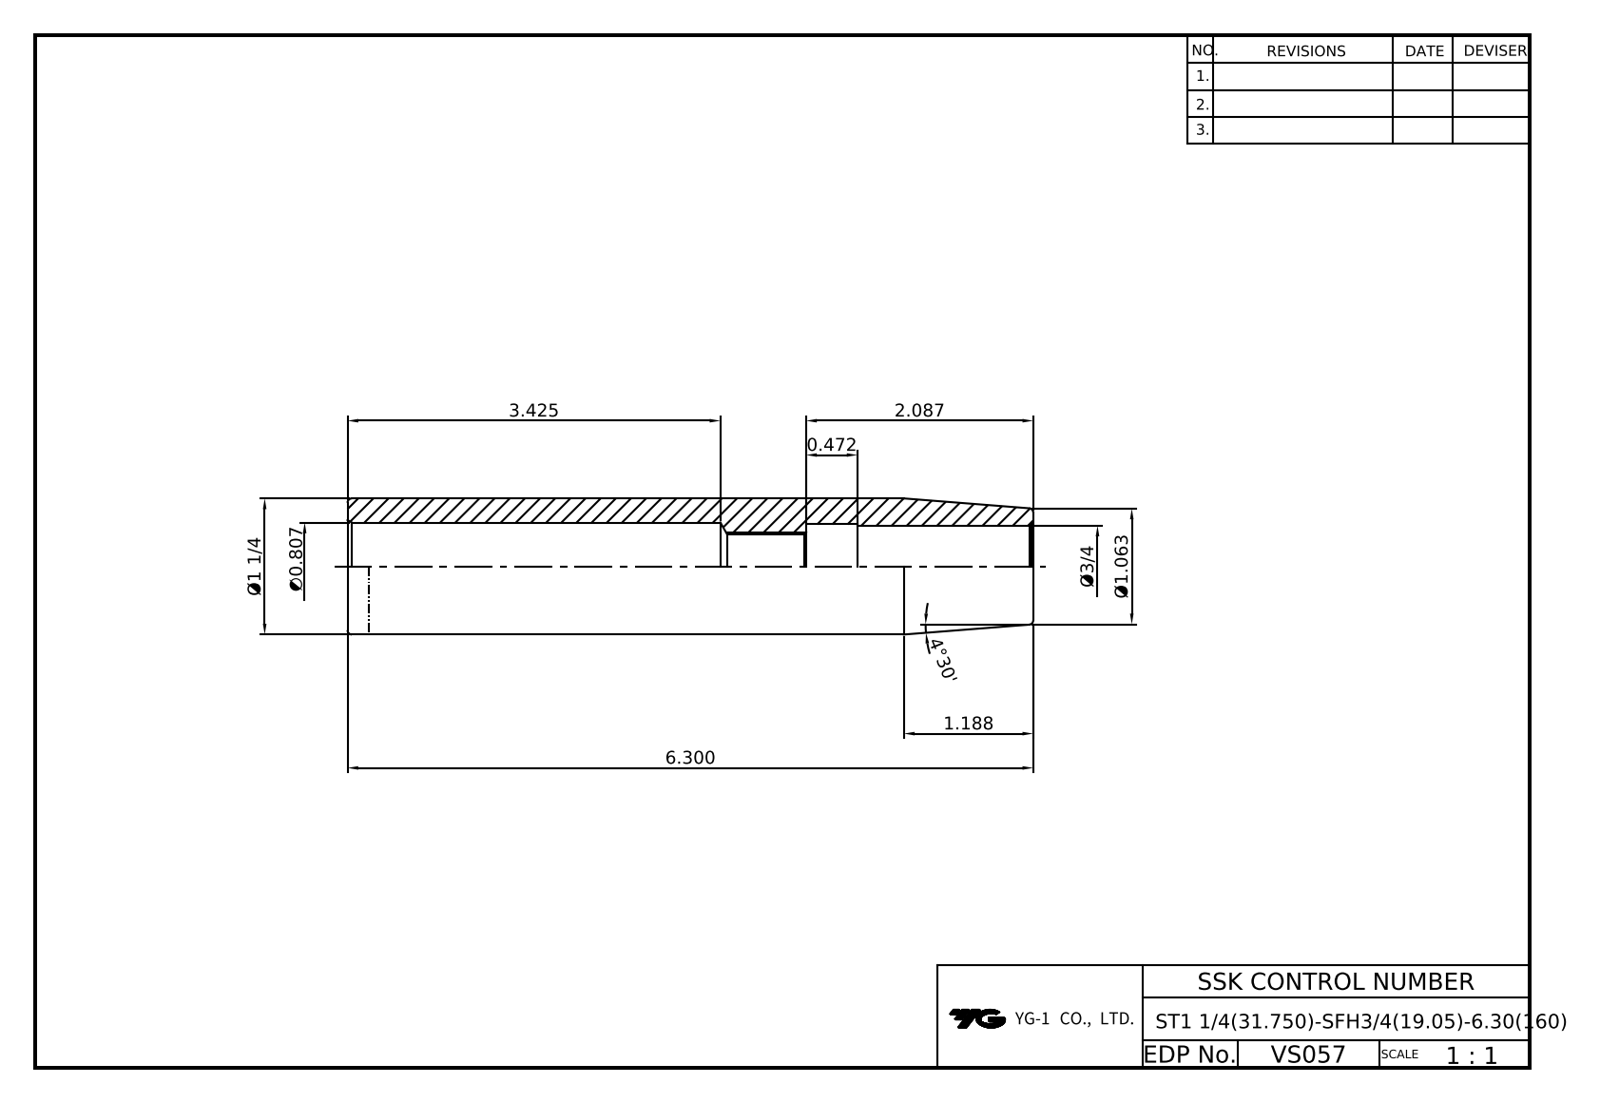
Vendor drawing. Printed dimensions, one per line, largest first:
6.300
4°30'
3.425
2.087
Ø1 1/4
1.188
Ø1.063
0.472
